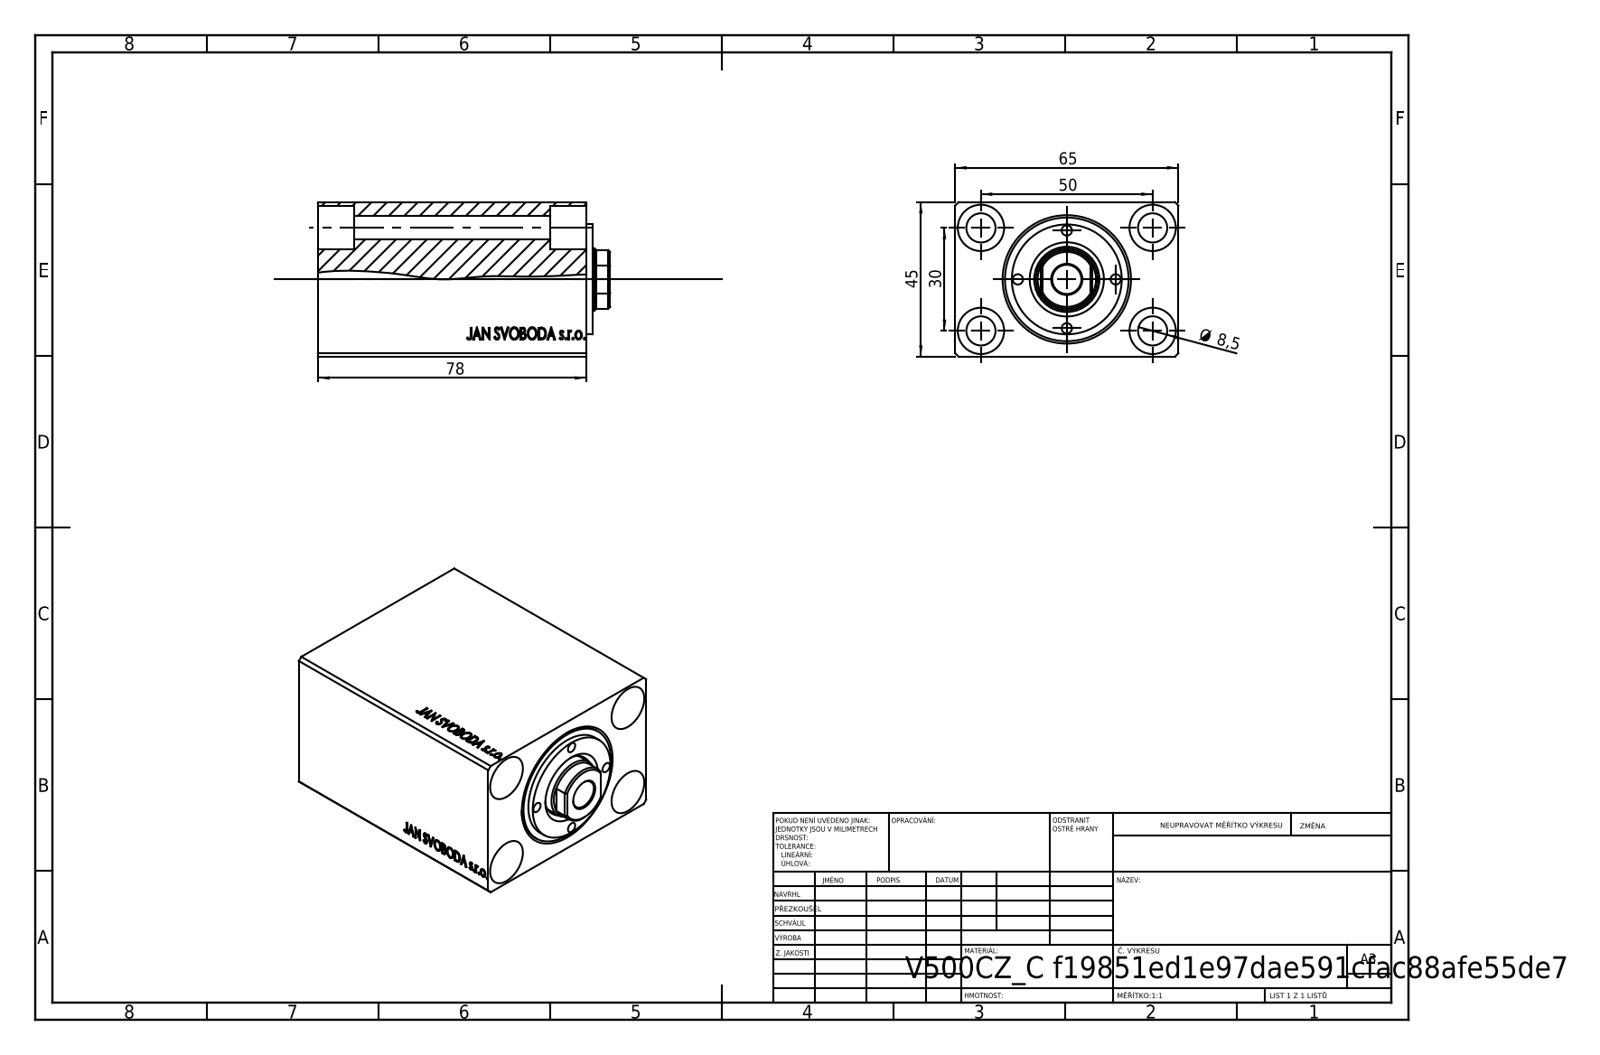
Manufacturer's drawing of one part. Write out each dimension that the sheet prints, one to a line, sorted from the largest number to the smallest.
78
65
50
45
30
Ø 8,5
